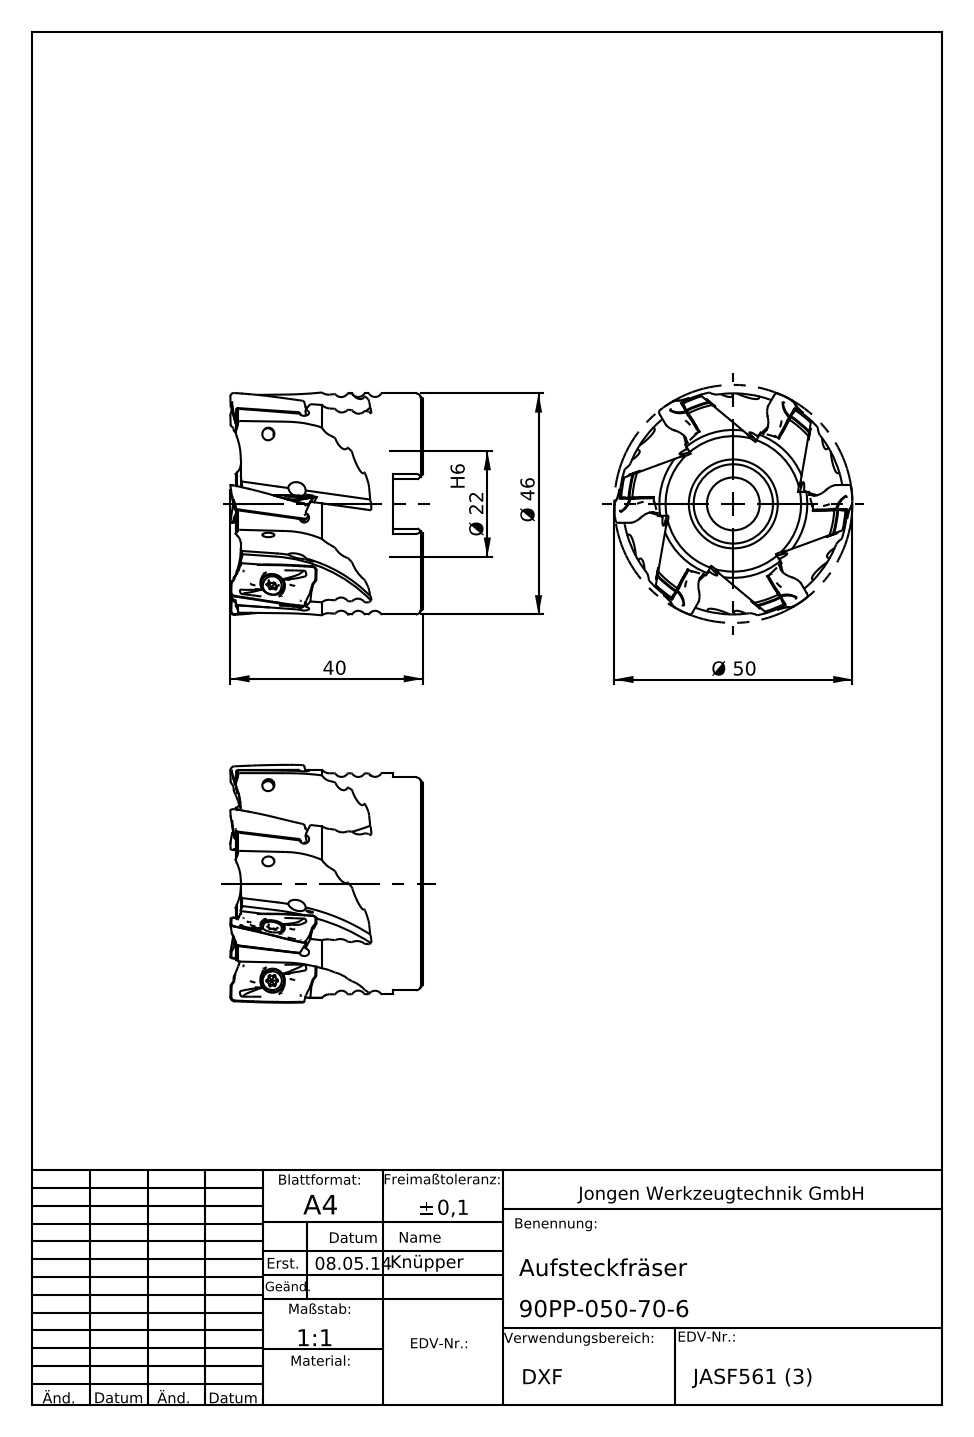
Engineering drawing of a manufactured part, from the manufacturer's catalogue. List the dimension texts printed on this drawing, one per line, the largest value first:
Ø 50
Ø 46
40
Ø 22 H6
